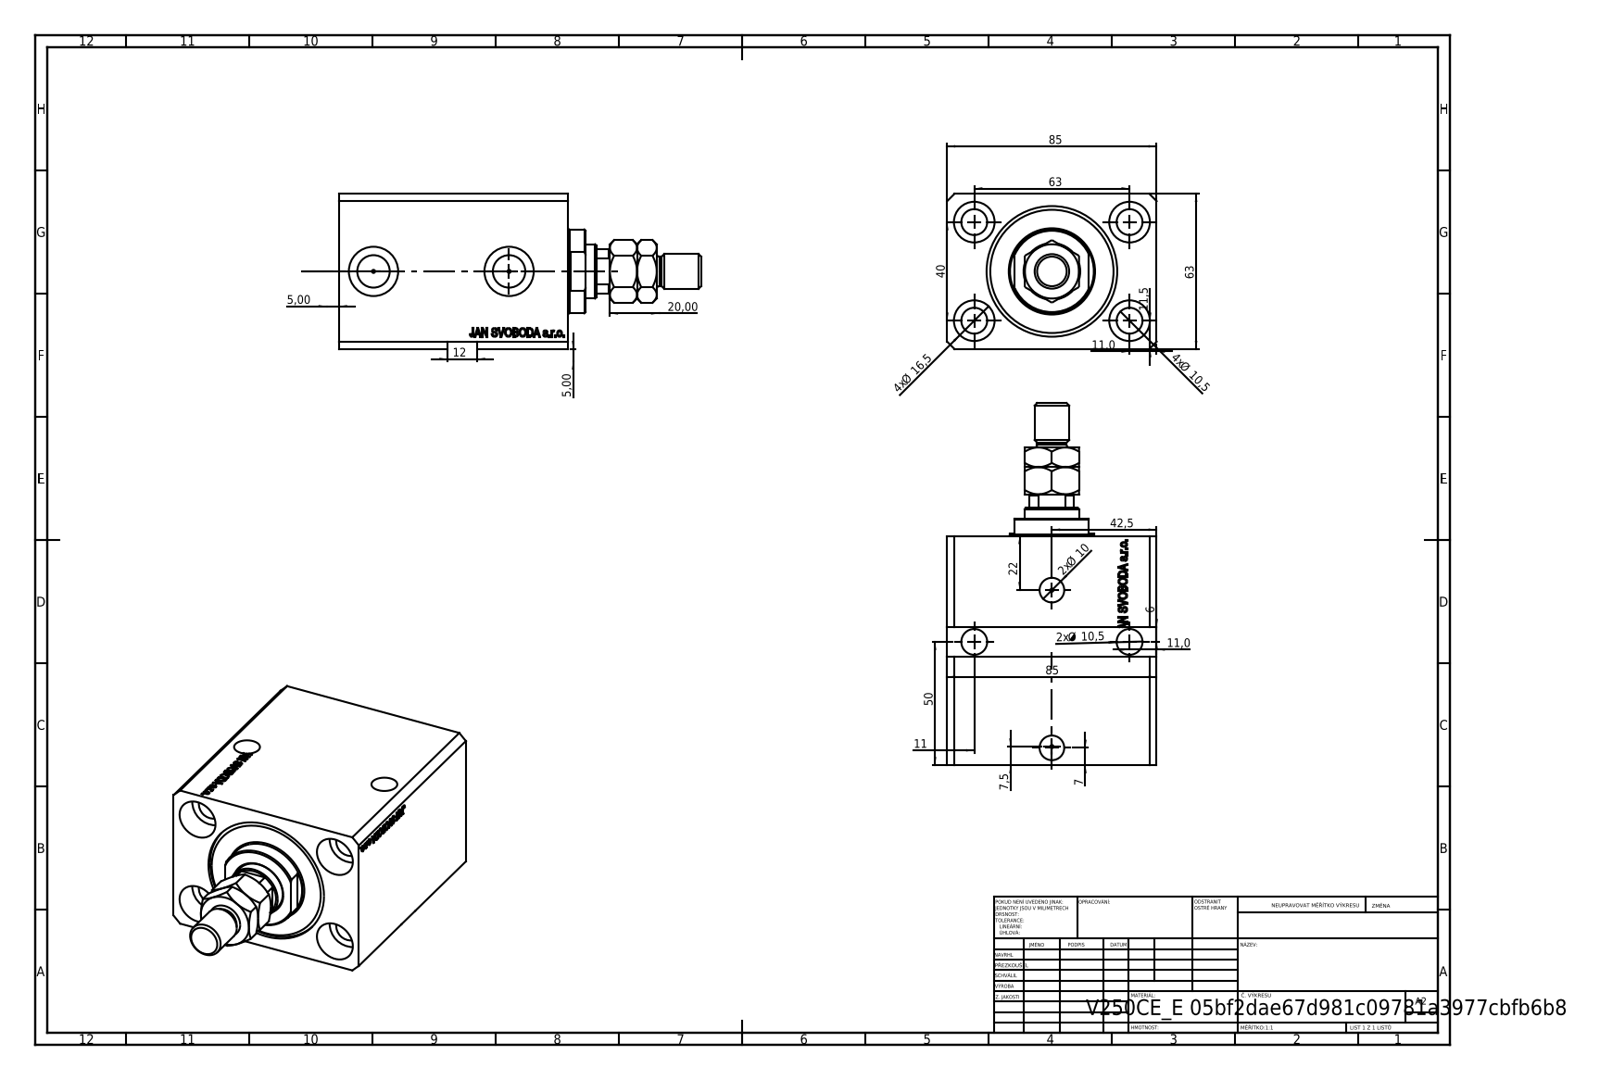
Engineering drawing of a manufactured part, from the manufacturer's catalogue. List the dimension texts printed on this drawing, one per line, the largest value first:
85
85
63
63
50
42,5
40
22
20,00
4x Ø 16,5
12
11,5
11,0
11,0
11
4x Ø 10,5
2x Ø 10,5
2x Ø 10
7,5
7
6
5,00
5,00
